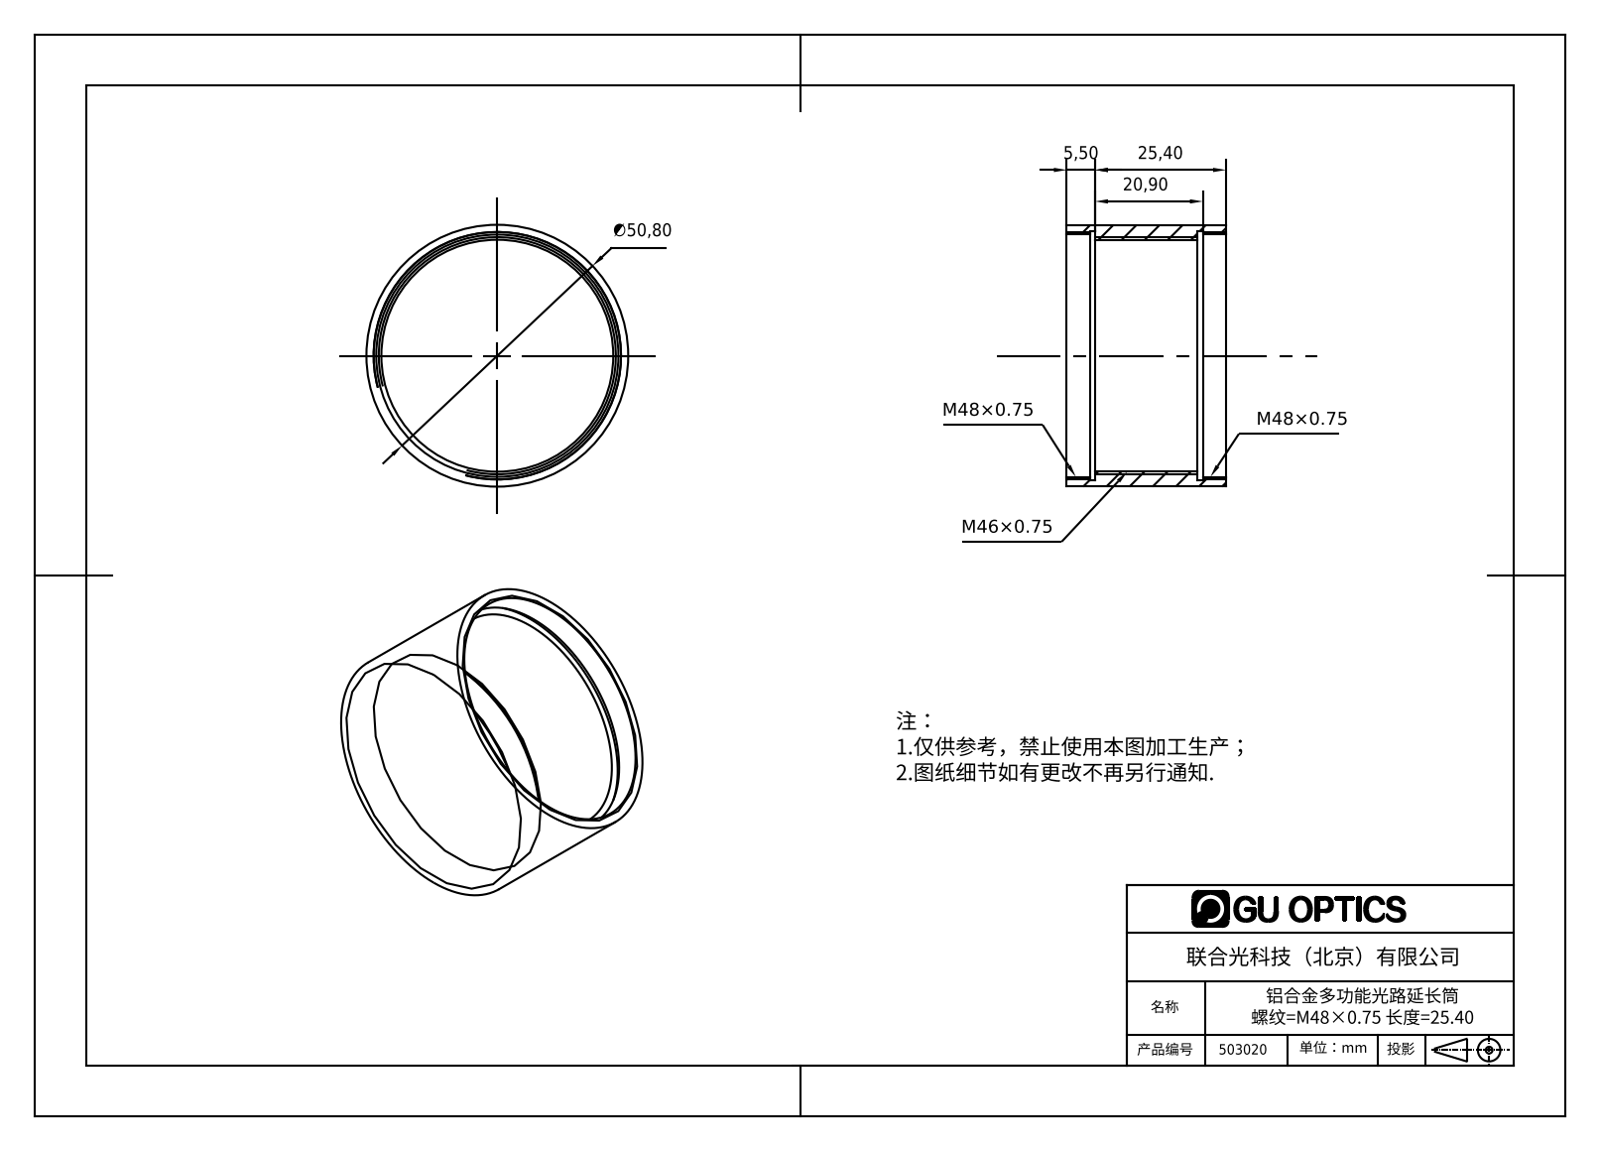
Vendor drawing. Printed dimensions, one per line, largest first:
∅50,80
25,40
20,90
5,50
